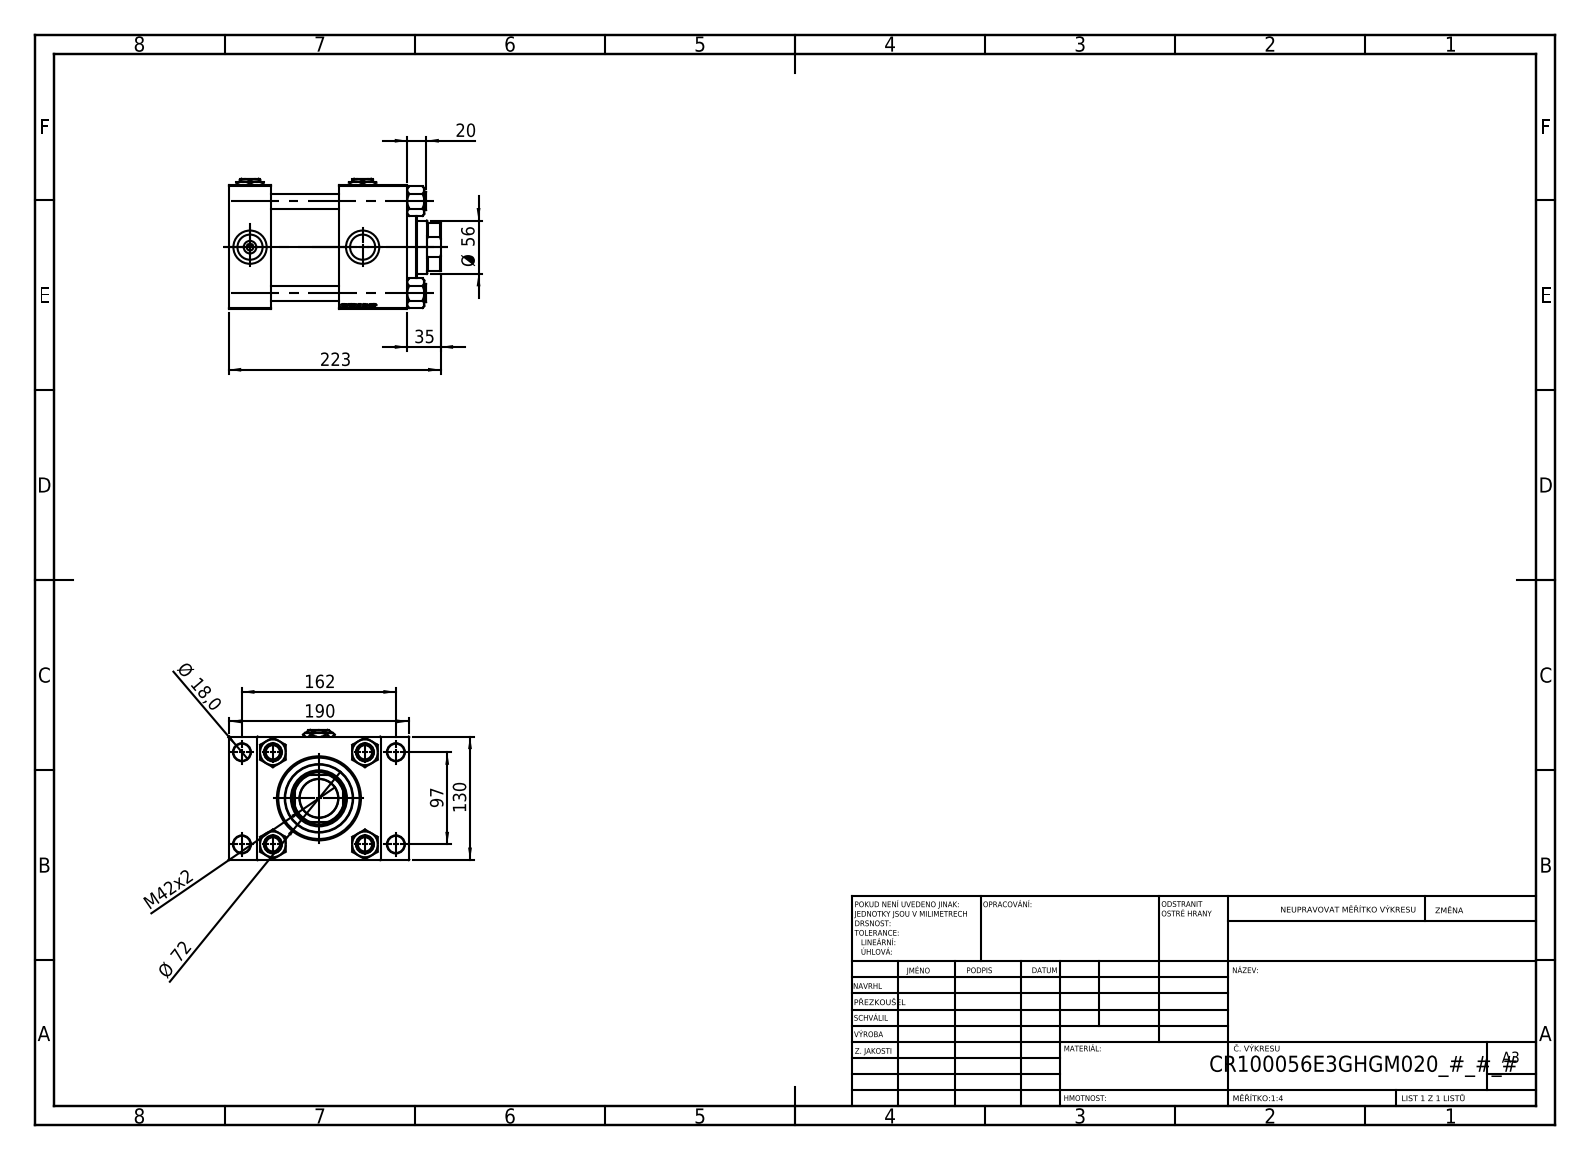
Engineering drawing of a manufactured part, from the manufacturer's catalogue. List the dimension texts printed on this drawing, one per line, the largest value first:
223
190
162
130
97
Ø 72
Ø 56
M42x2
35
20
Ø 18,0
